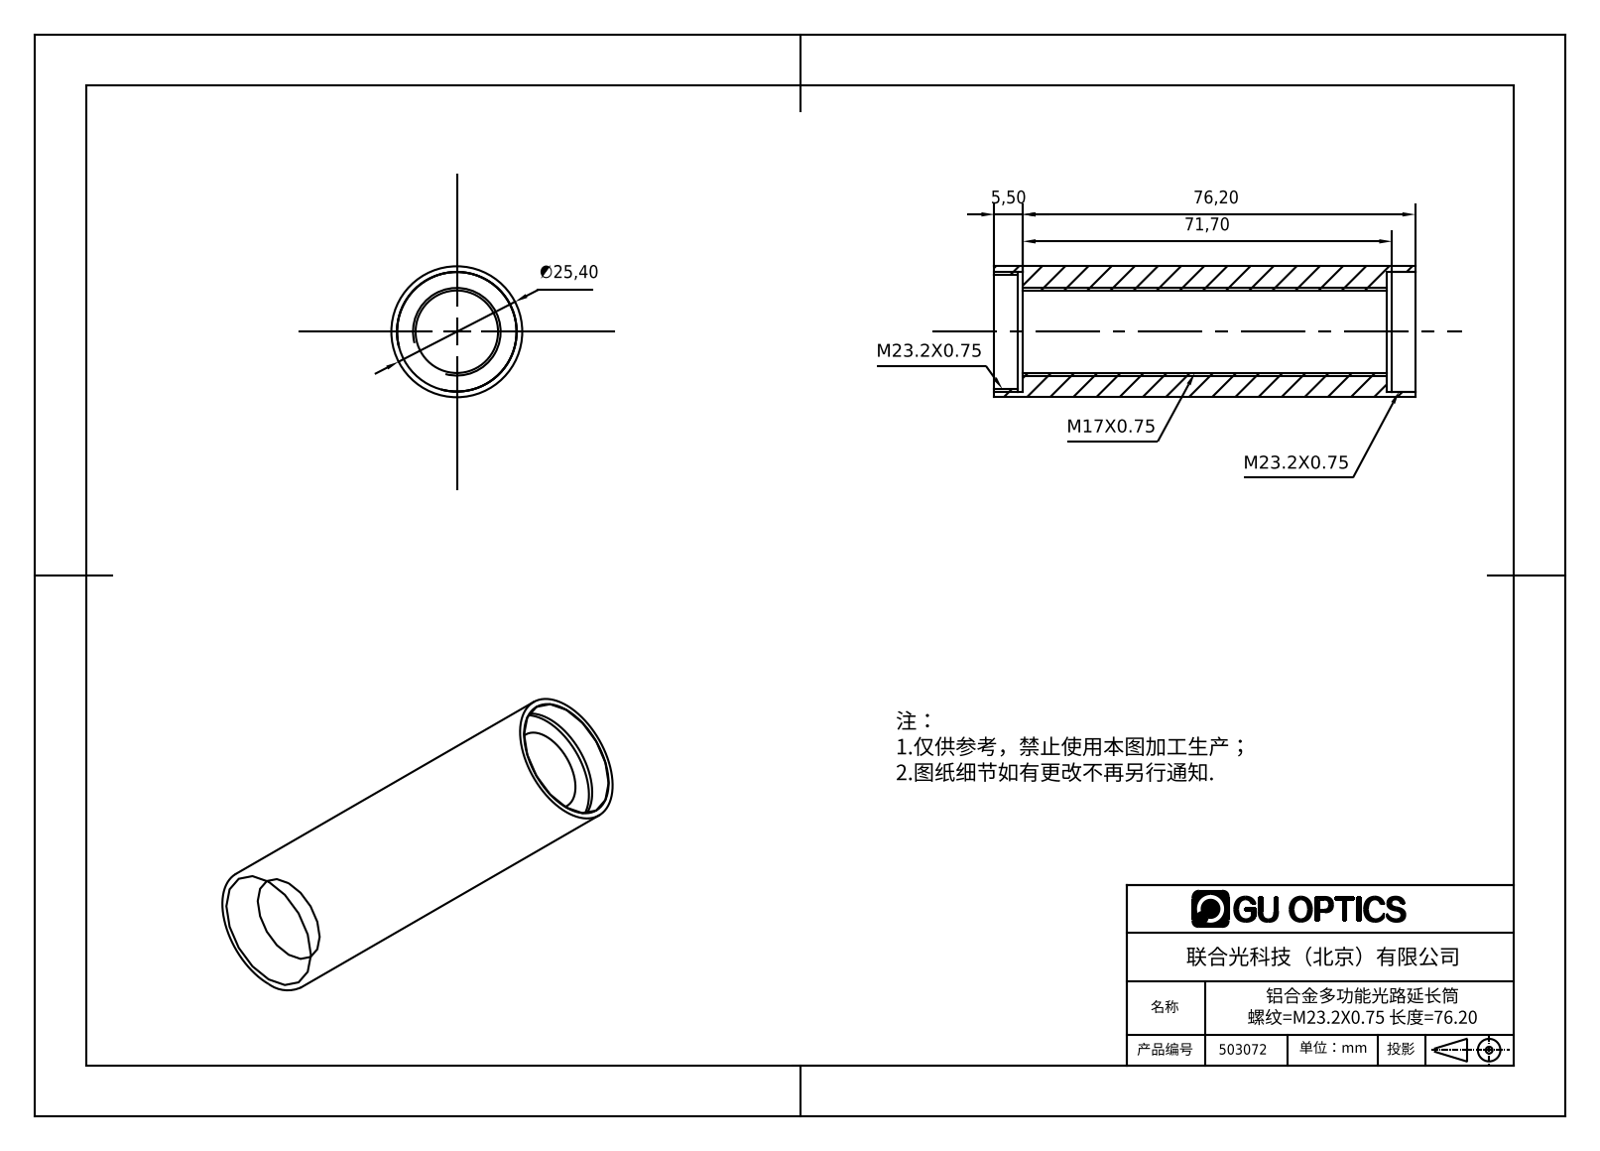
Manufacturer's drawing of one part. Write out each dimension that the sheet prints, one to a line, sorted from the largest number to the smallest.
76,20
71,70
∅25,40
5,50
